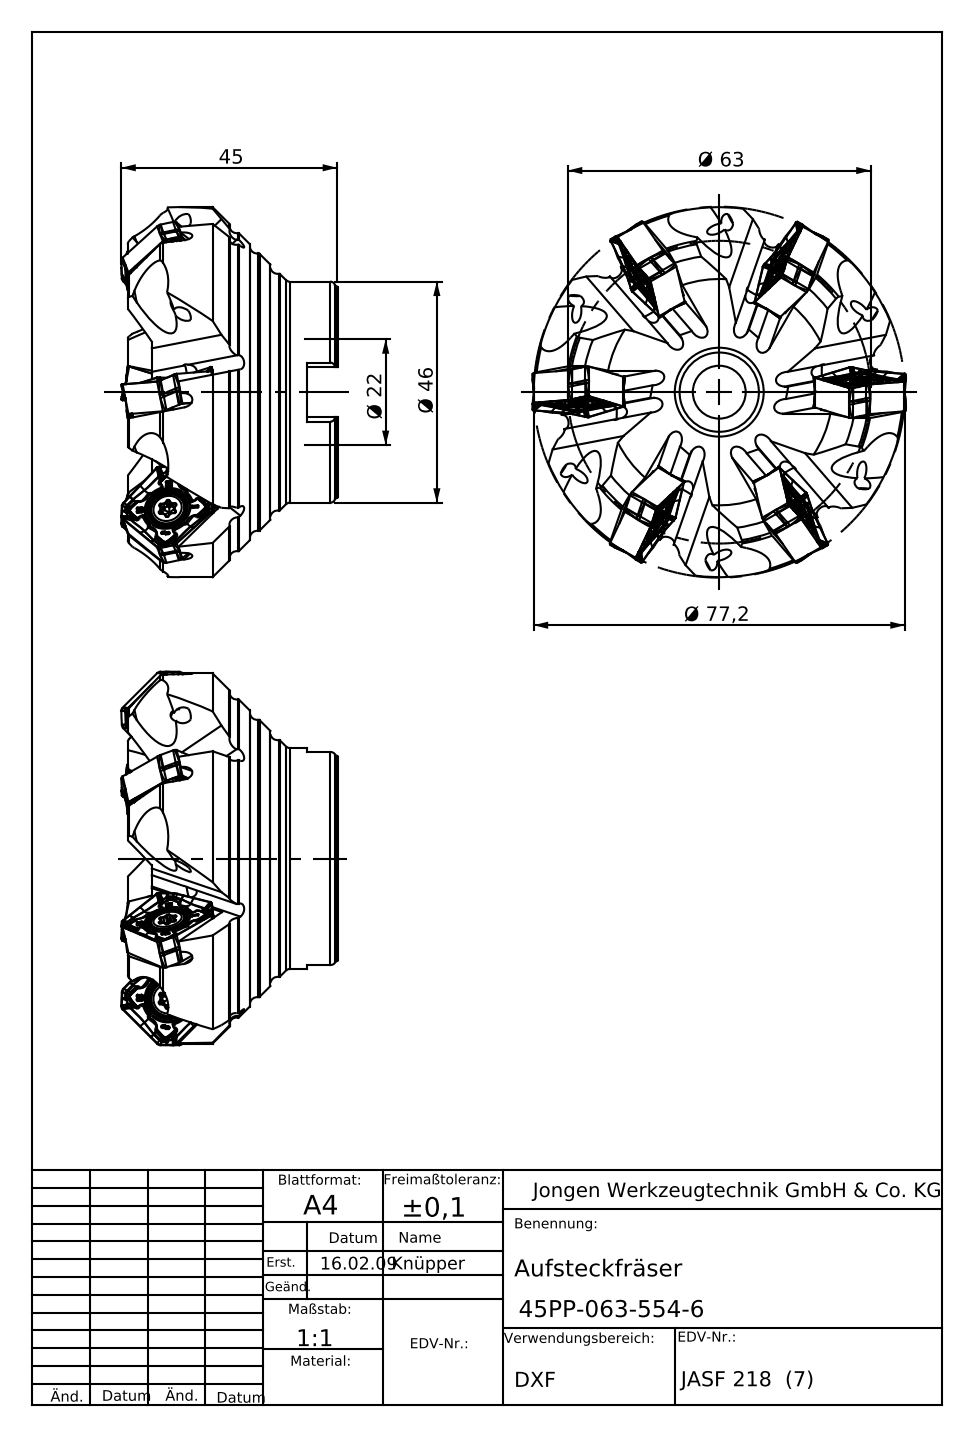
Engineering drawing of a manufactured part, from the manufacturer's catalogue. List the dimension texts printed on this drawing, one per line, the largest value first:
Ø 77,2
Ø 63
Ø 46
45
Ø 22
